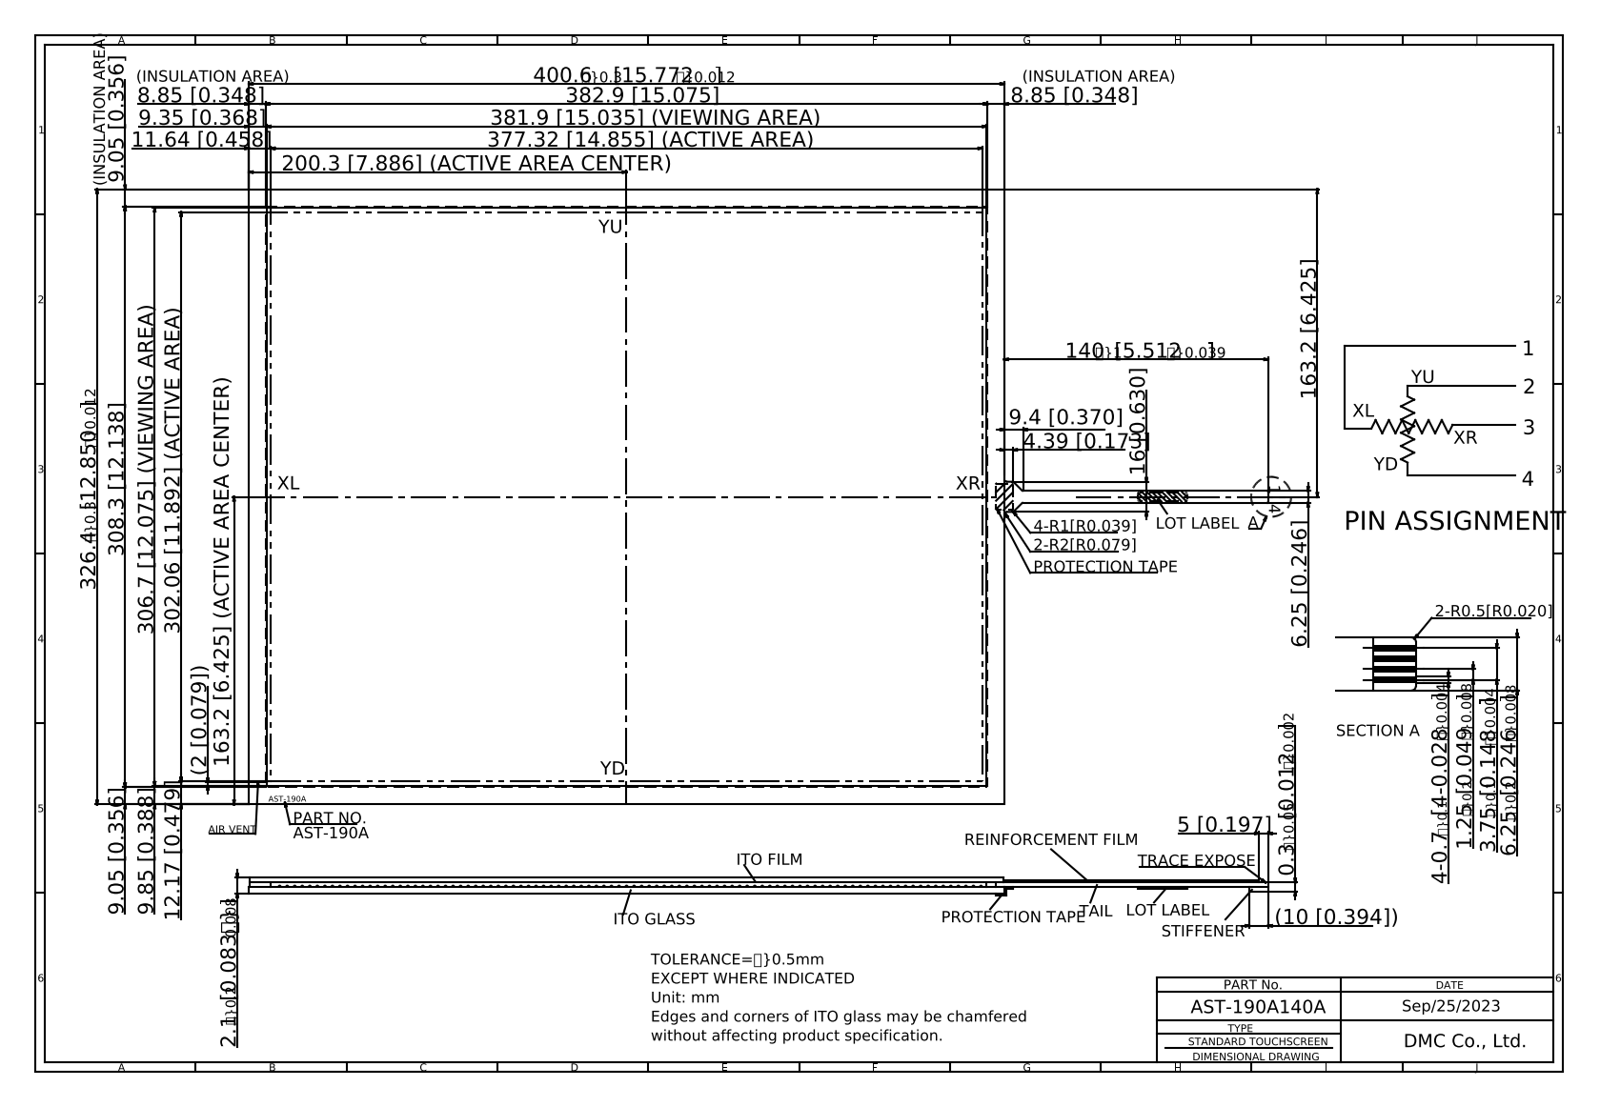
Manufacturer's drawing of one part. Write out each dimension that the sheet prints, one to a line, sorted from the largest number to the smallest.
400.60
382.9 [15.075]
381.9 [15.035] (VIEWING AREA)
377.32 [14.855] (ACTIVE AREA)
326.40
308.3 [12.138]
306.7 [12.075] (VIEWING AREA)
302.06 [11.892] (ACTIVE AREA)
200.3 [7.886] (ACTIVE AREA CENTER)
163.2 [6.425]
163.2 [6.425] (ACTIVE AREA CENTER)
140.00
16 [0.630]
12.17 [0.479]
11.64 [0.458]
(10 [0.394])
9.85 [0.388]
9.4 [0.370]
9.35 [0.368]
9.05 [0.356]
9.05 [0.356]
8.85 [0.348]
8.85 [0.348]
6.25{\H0.6667x;?}0.2}[0.246{\H0.675x;?}0.008}]
6.25 [0.246]
5 [0.197]
4.39 [0.173]
4-0.7{\H0.6x;?}0.1}[4-0.028{\H0.675x;?}0.004}]
3.75{\H0.6x;?}0.1}[0.148{\H0.675x;?}0.004}]
2.1{\H0.6667x;?}0.2}[0.083?}{\H0.675x;0.008}]
(2 [0.079])
1.25{\H0.6x;?}0.2}[0.049{\H0.675x;?}0.008}]
0.3{\H0.6667x;?}0.05}[0.012{\H0.675x;?}0.002}]
